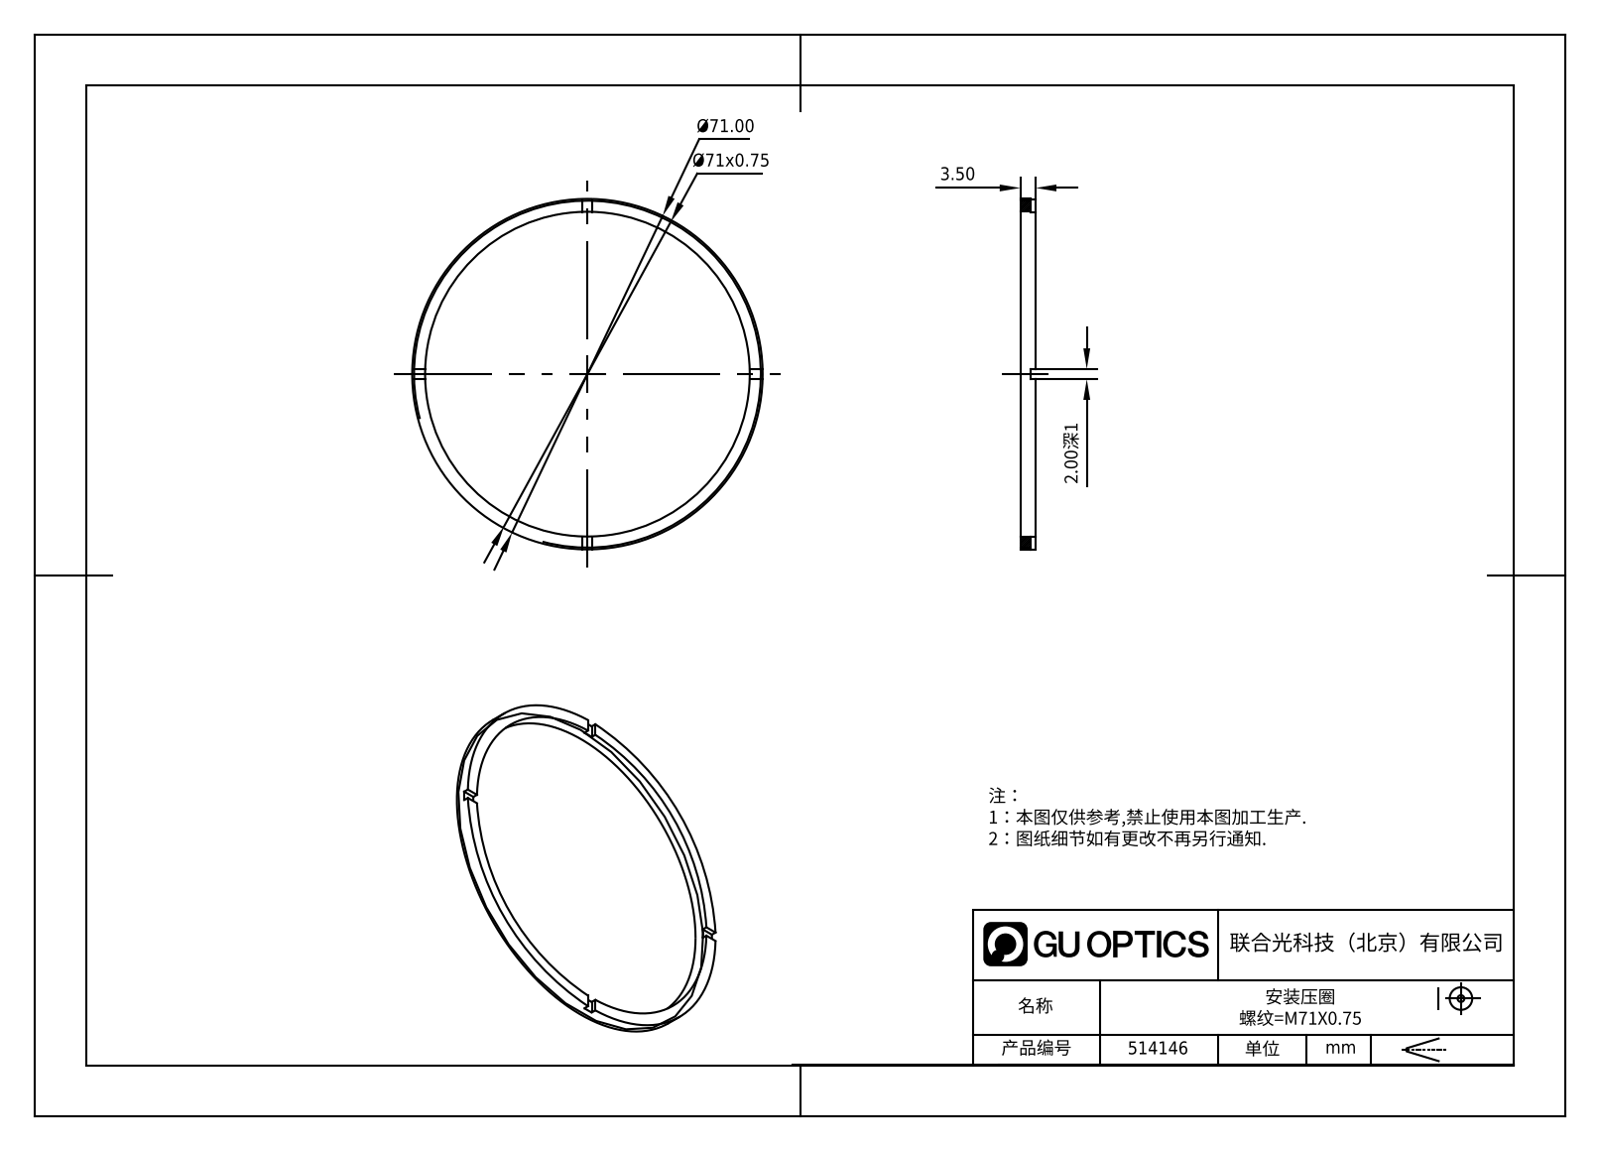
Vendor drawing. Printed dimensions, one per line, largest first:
Ø71.00
Ø71x0.75
3.50
2.00深1
